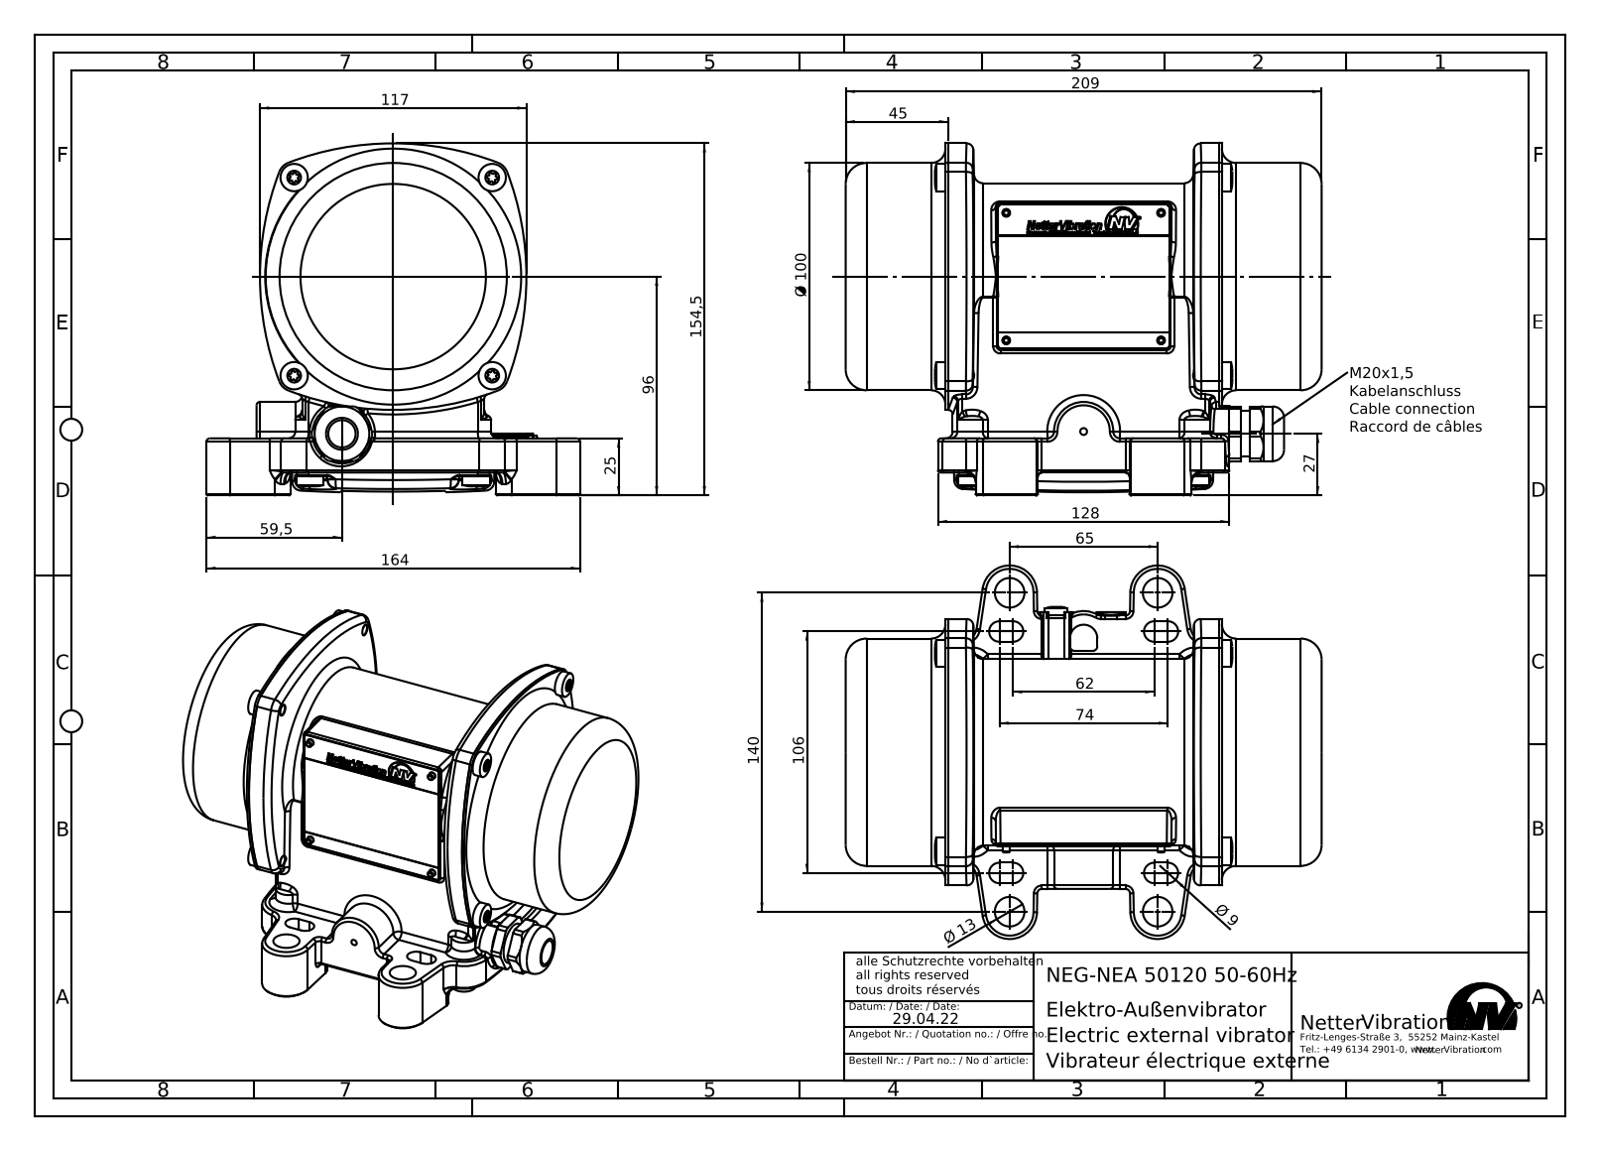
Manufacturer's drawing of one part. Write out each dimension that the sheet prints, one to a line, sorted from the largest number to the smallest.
209
164
154,5
140
128
117
106
Ø 100
96
74
65
62
59,5
45
27
25
Ø 13
Ø 9
